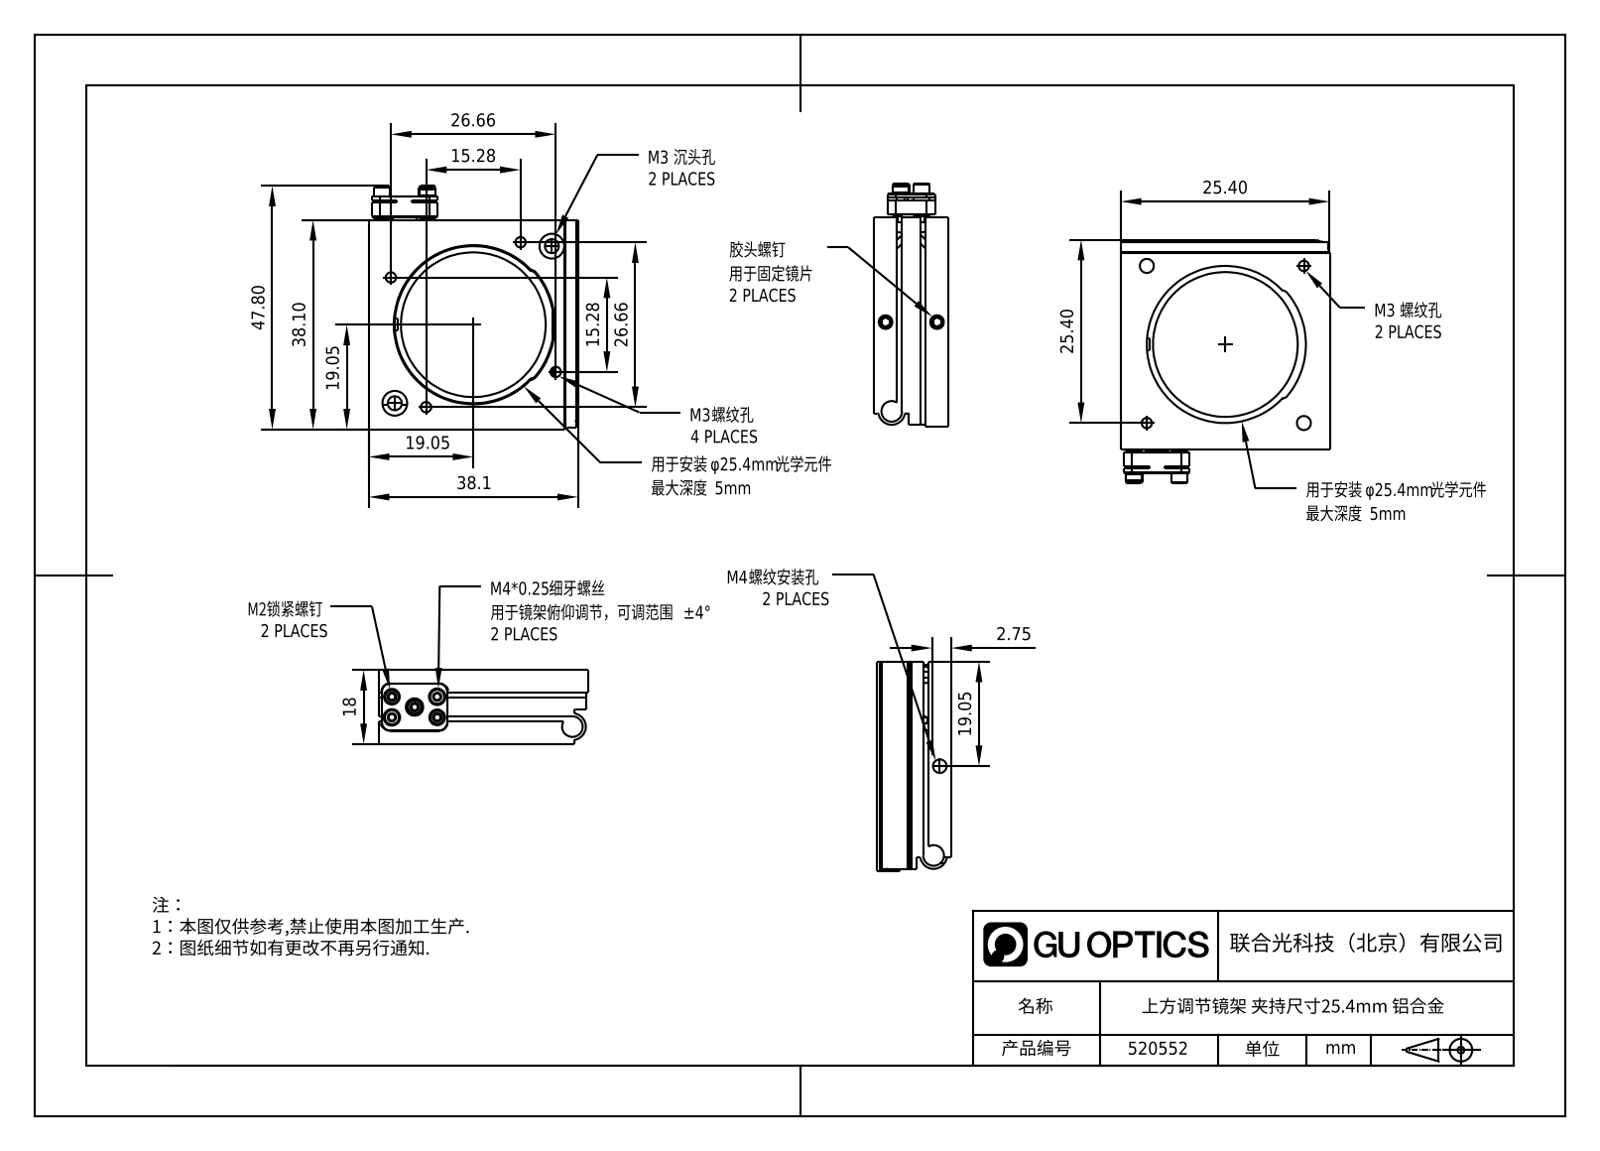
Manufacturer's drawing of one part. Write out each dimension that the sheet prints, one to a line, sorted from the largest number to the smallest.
47.80
38.1
38.10
26.66
26.66
25.40
25.40
19.05
19.05
19.05
18
15.28
15.28
2.75
